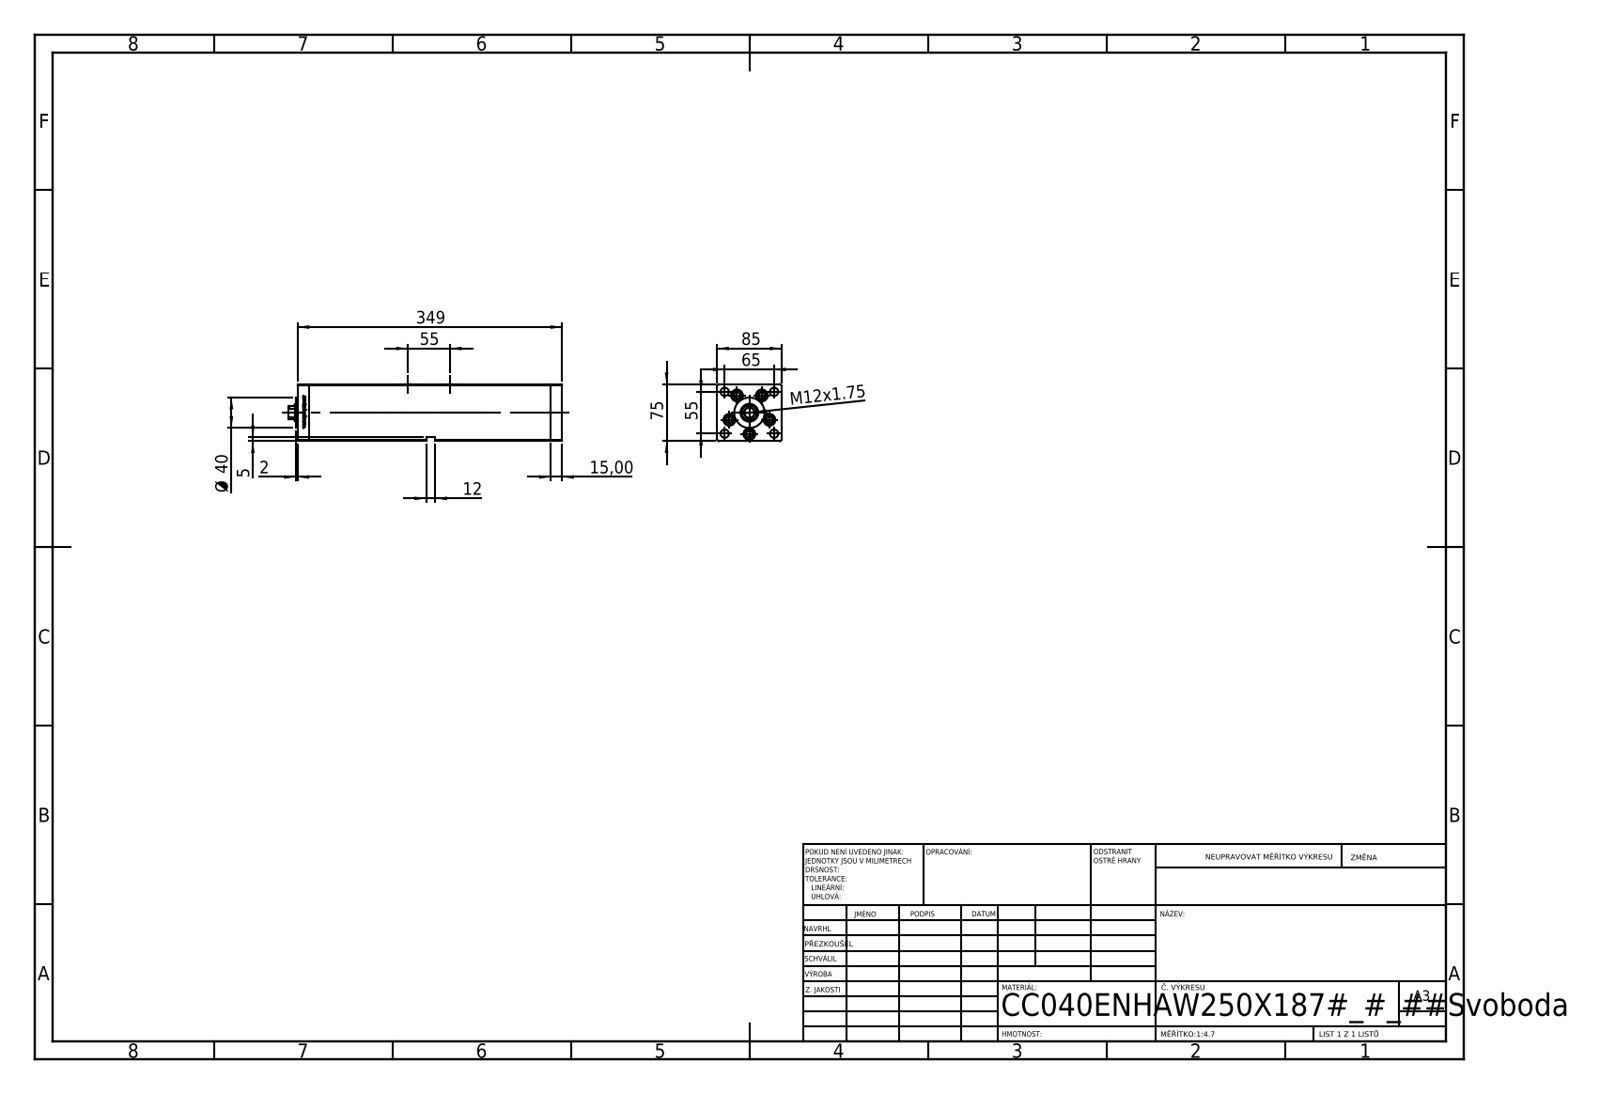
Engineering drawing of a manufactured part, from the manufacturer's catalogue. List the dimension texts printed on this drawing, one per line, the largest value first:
349
85
75
65
55
55
Ø 40
15,00
12
M12x1.75
5
2
